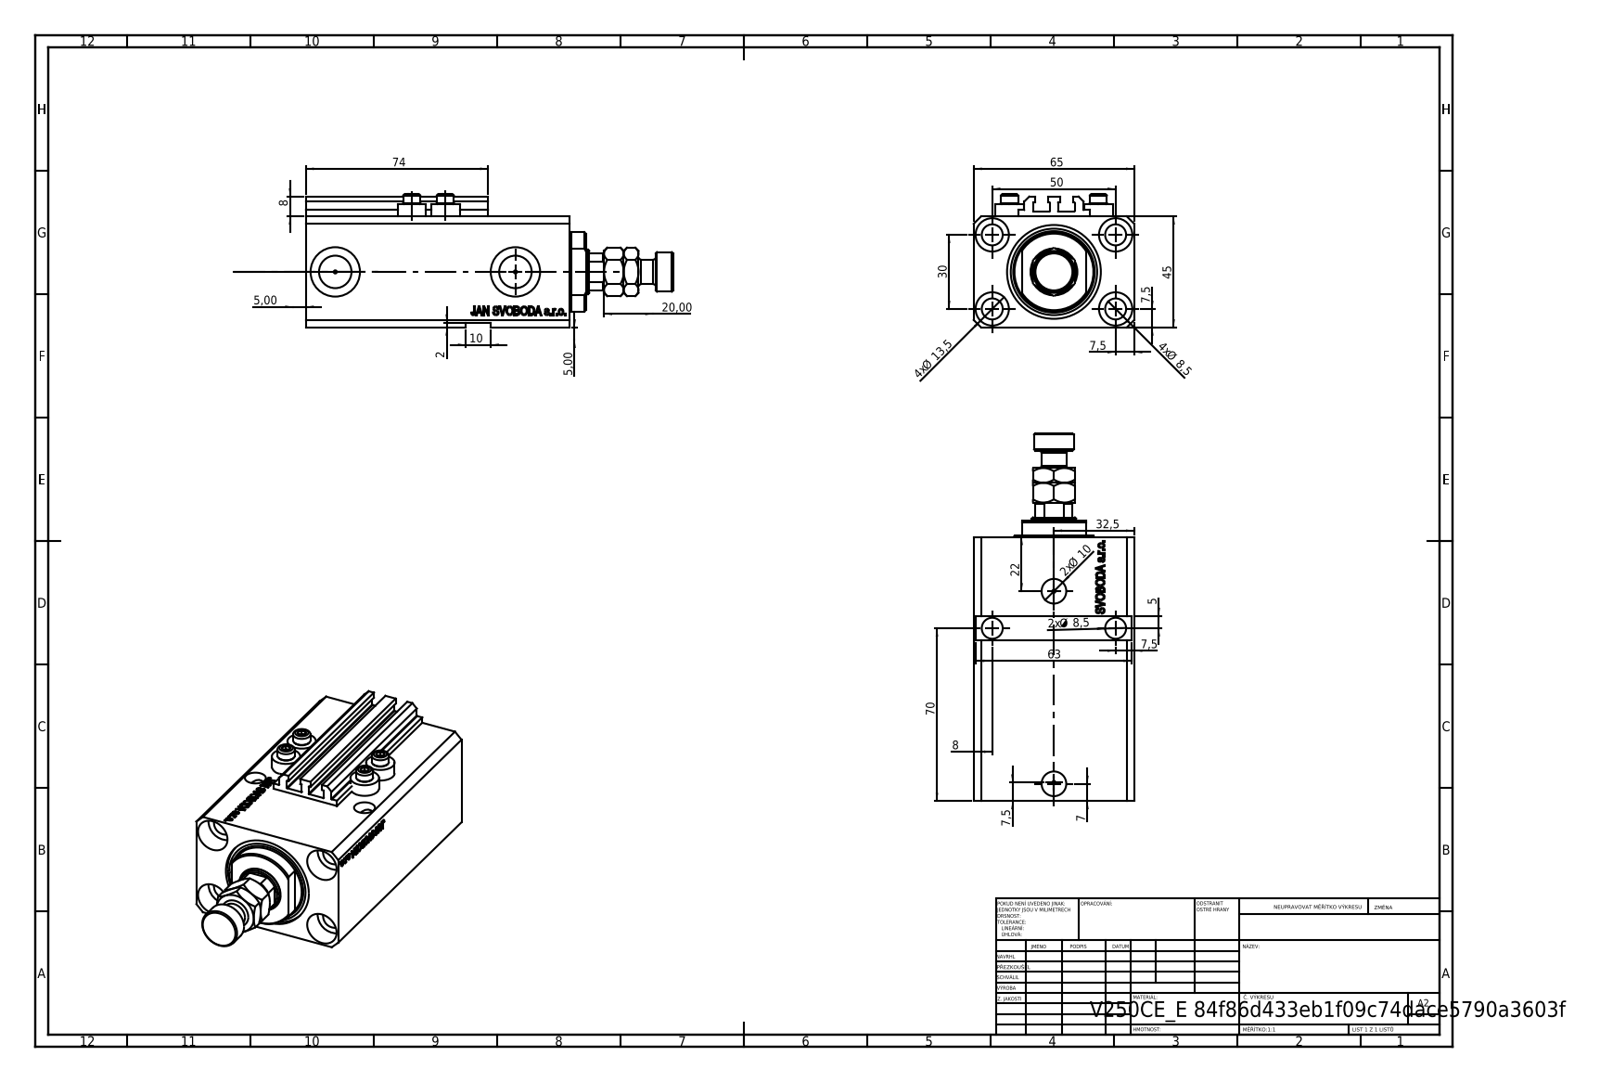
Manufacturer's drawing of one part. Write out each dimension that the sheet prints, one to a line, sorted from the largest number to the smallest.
74
70
65
63
50
45
32,5
30
22
20,00
4x Ø 13,5
10
2x Ø 10
4x Ø 8,5
2x Ø 8,5
8
8
7,5
7,5
7,5
7,5
7
5,00
5,00
5
2
